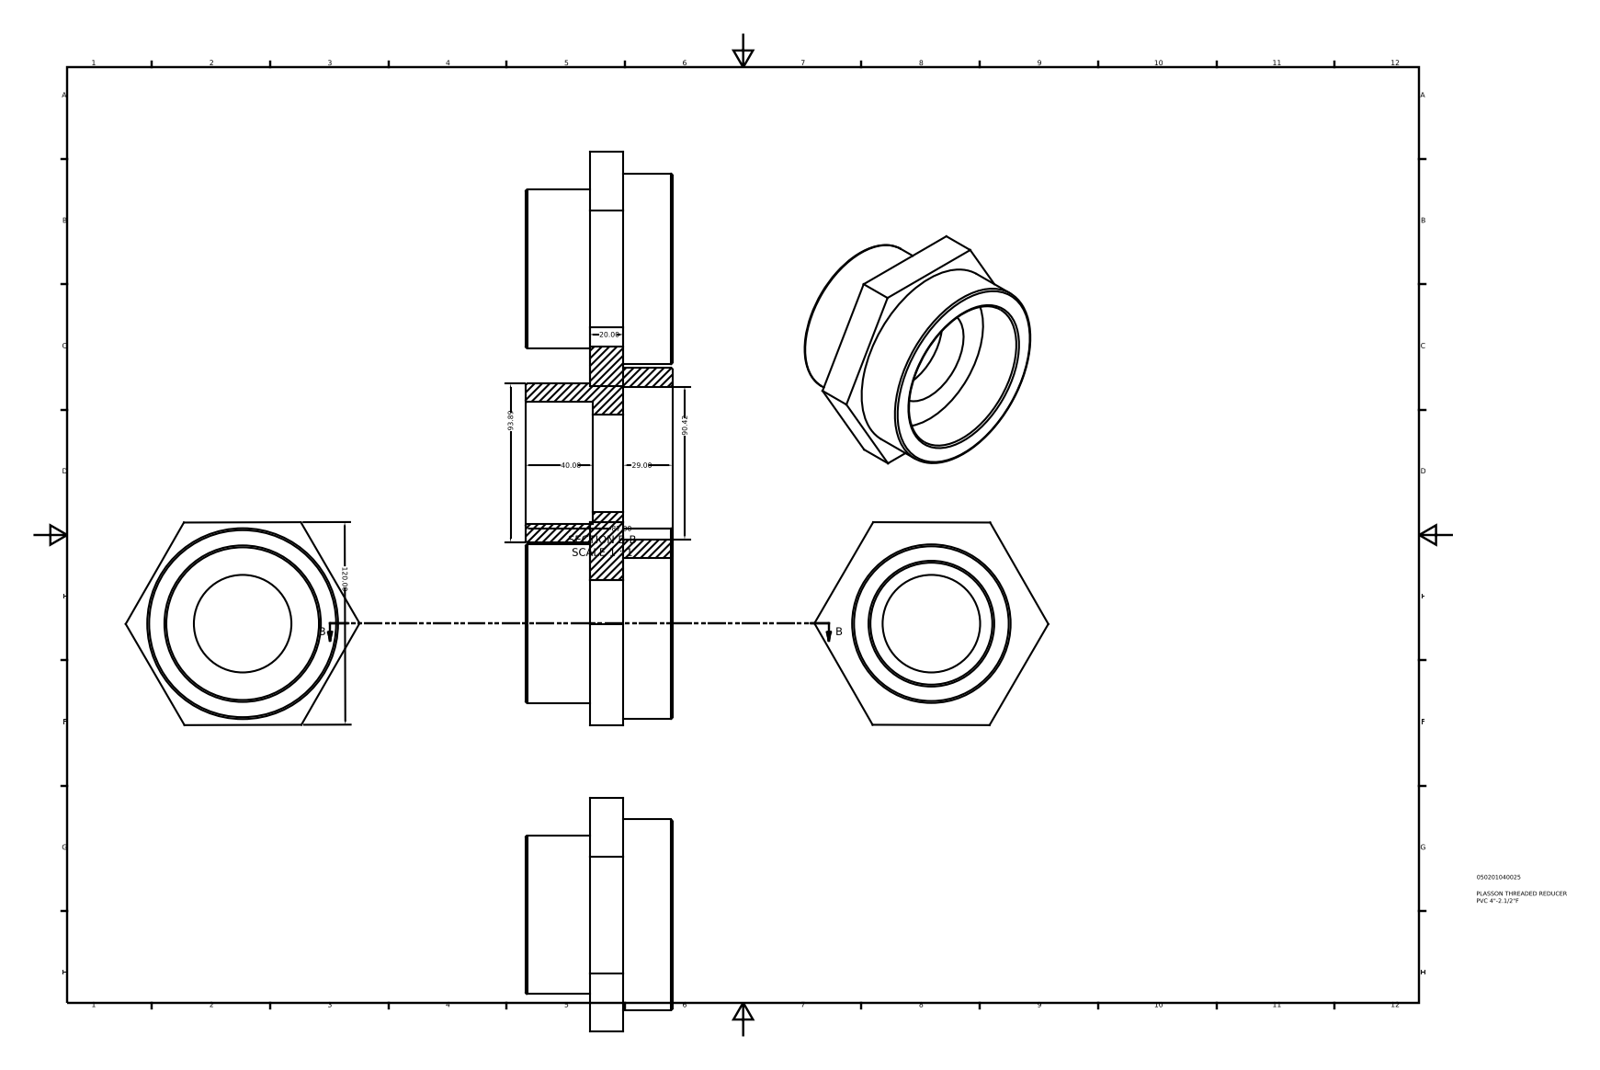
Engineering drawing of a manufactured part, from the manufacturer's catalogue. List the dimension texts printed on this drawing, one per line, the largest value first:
120.00
93.89
90.42
87.00
40.00
29.00
20.00
